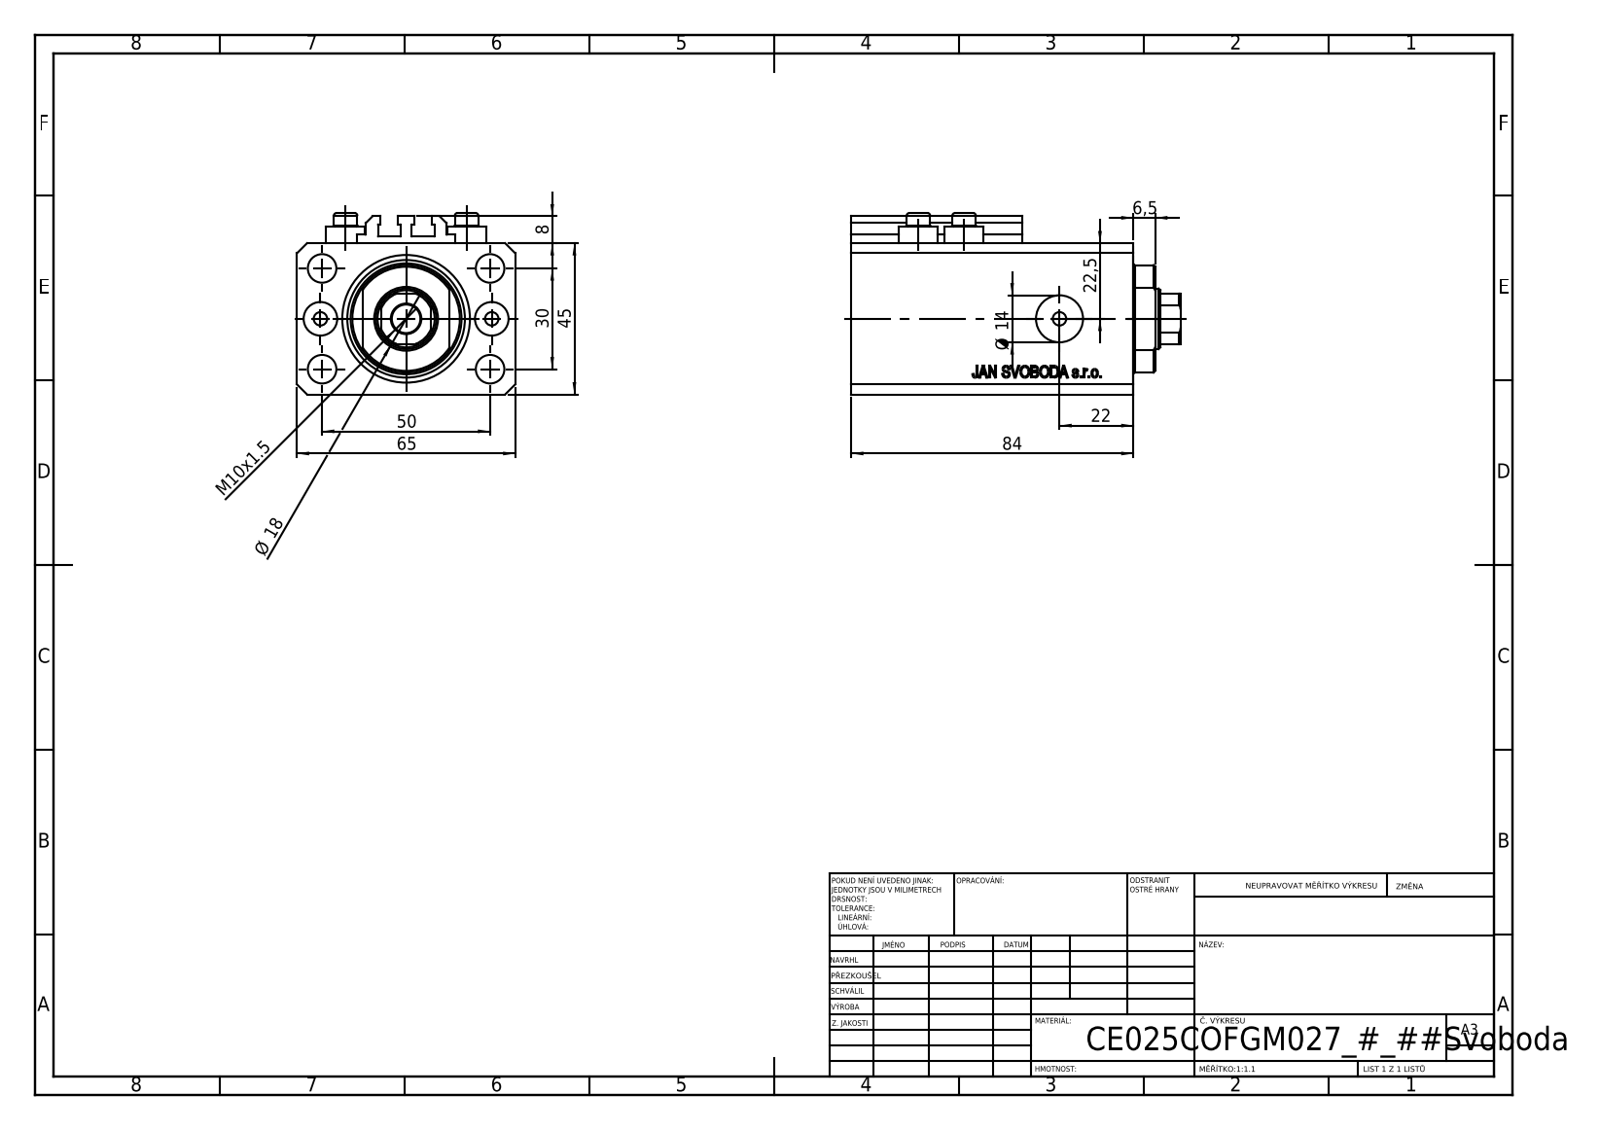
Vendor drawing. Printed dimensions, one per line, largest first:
84
65
50
45
30
22,5
22
Ø 18
Ø 14
M10x1.5
8
6,5
